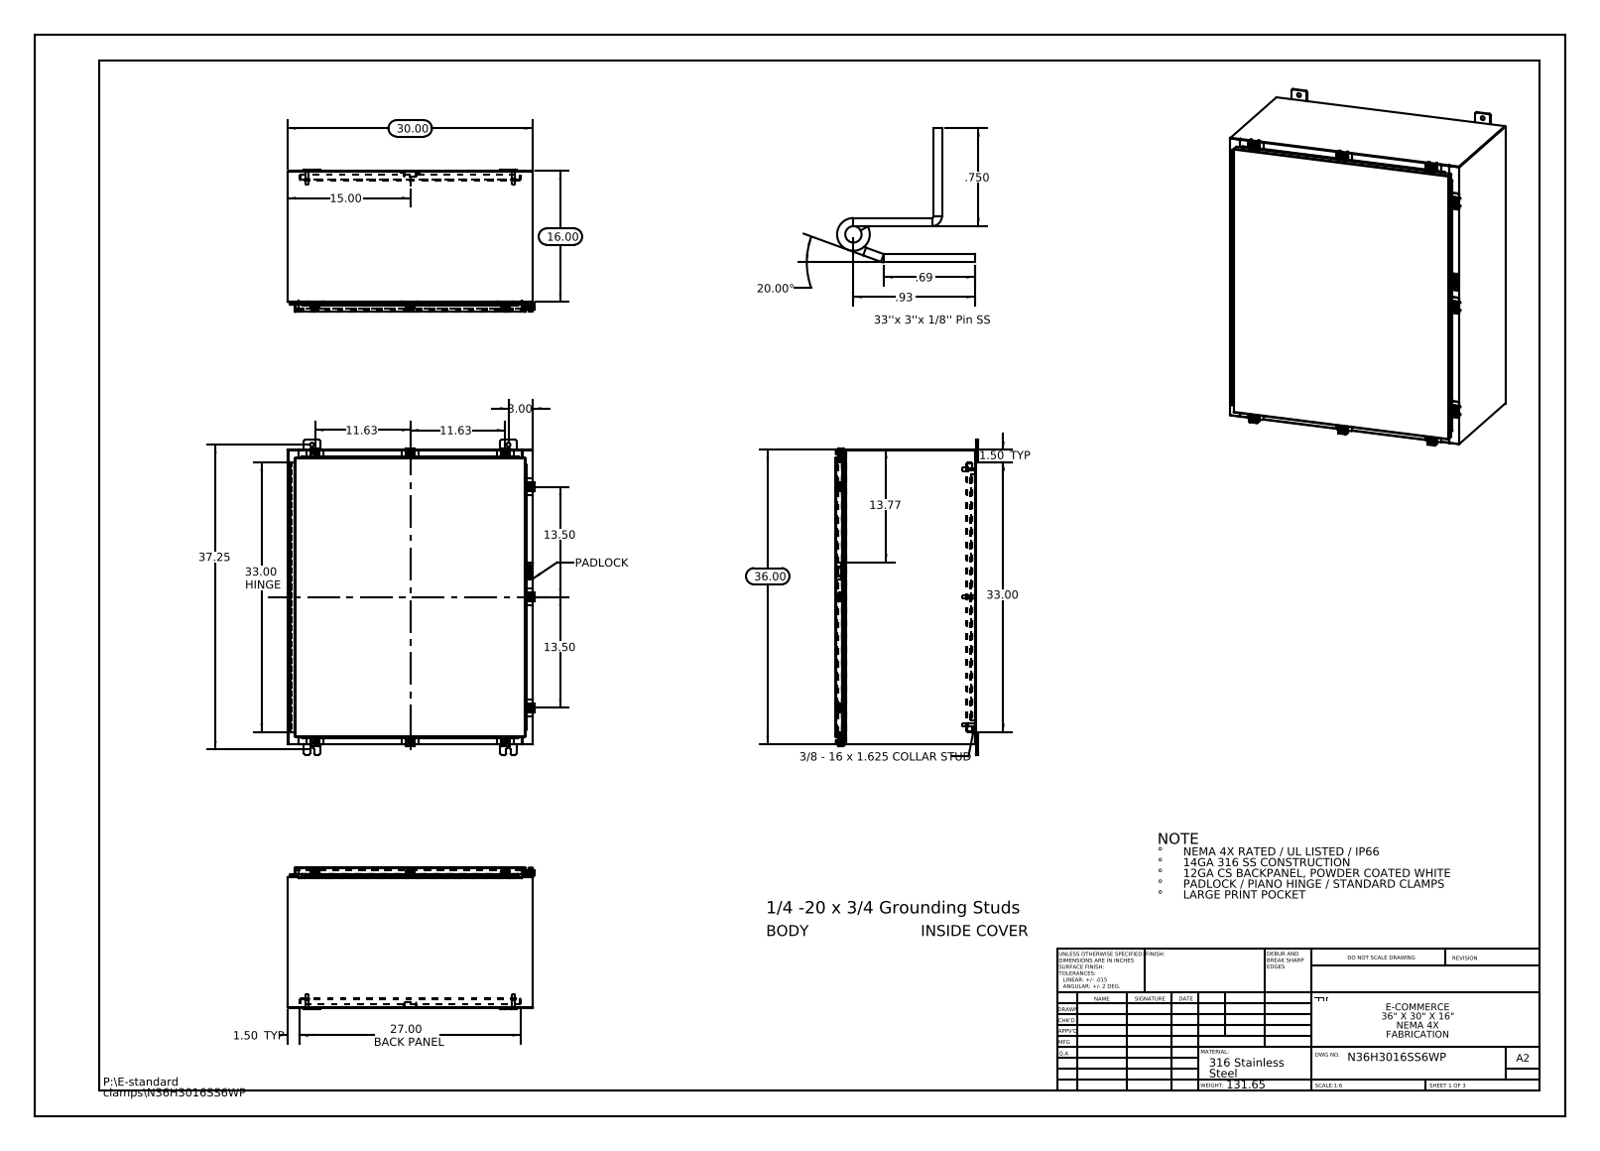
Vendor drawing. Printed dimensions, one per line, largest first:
37.25
36.00
33.00 HINGE
33.00
30.00
27.00 BACK PANEL
20.00°
16.00
15.00
13.77
13.50
13.50
11.63
11.63
3.00
1.50 TYP
1.50 TYP
.93
.750
.69
